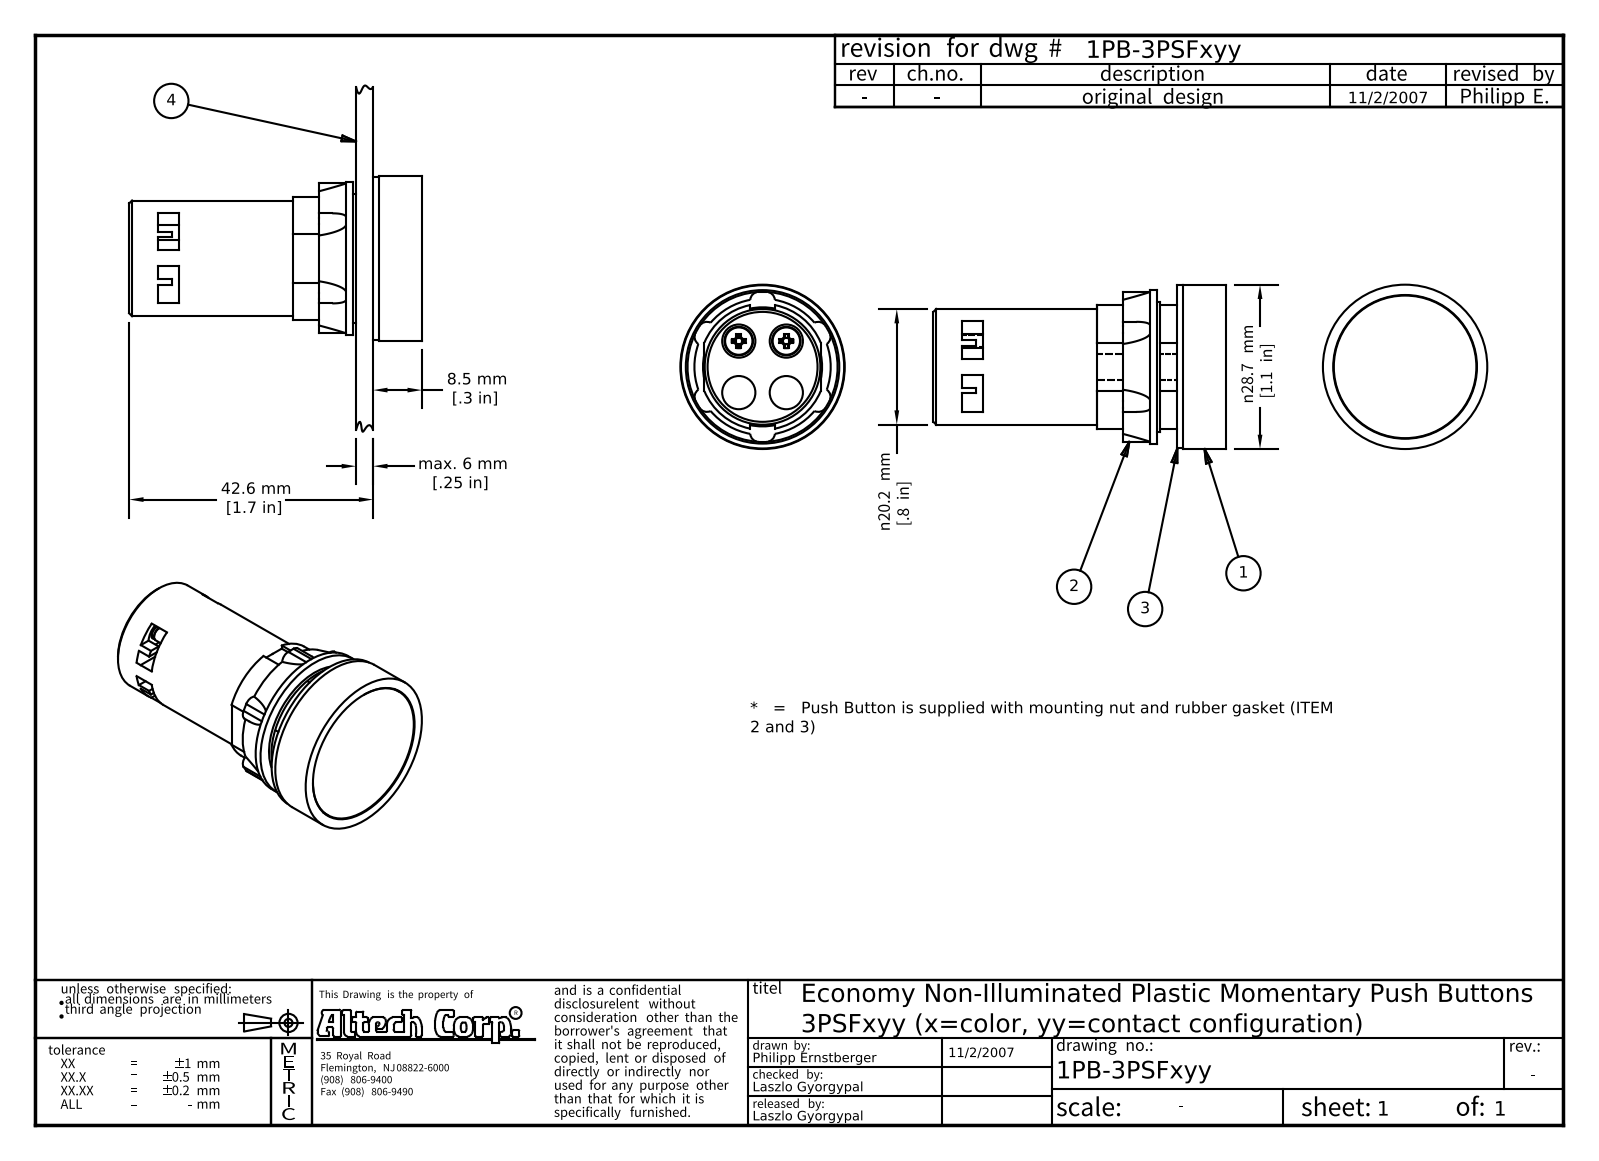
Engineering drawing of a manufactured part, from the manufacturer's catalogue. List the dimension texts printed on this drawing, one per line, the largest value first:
42.6 mm [1.7 in]
n28.7 mm [1.1 in]
n20.2 mm [.8 in]
8.5 mm [.3 in]
max. 6 mm [.25 in]
